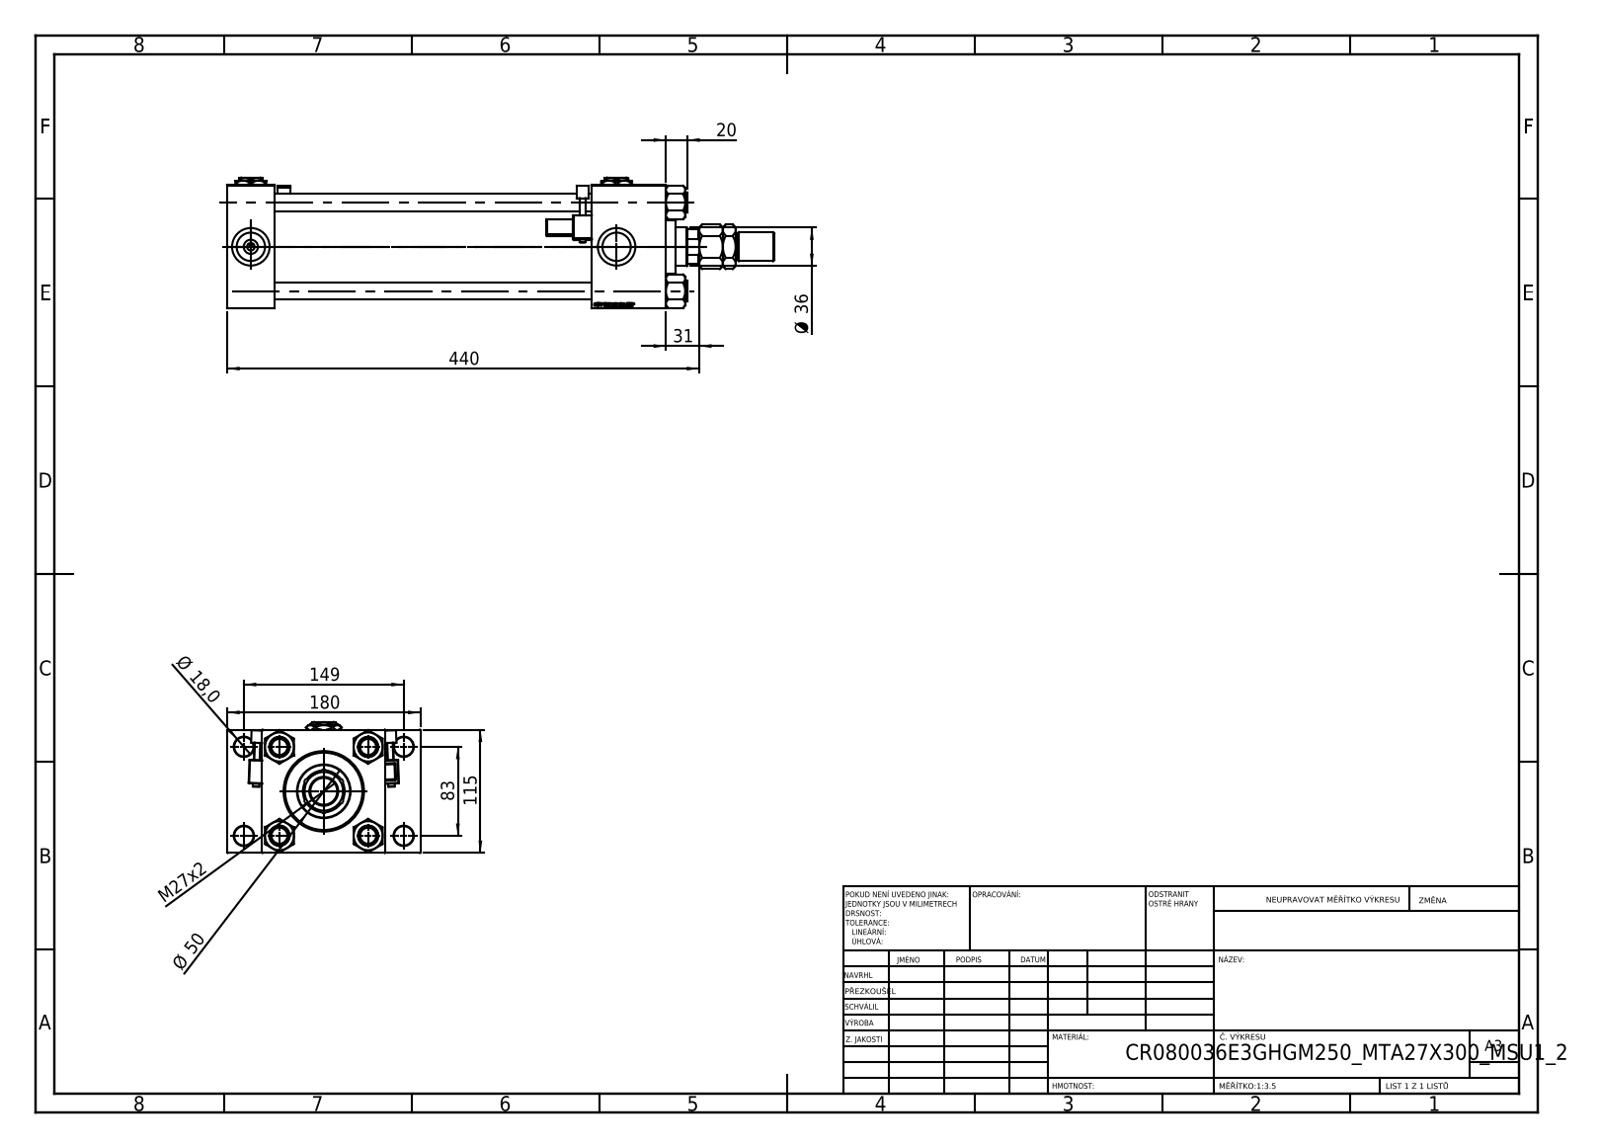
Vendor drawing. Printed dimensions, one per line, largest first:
440
180
149
115
83
Ø 50
Ø 36
31
M27x2
20
Ø 18,0
